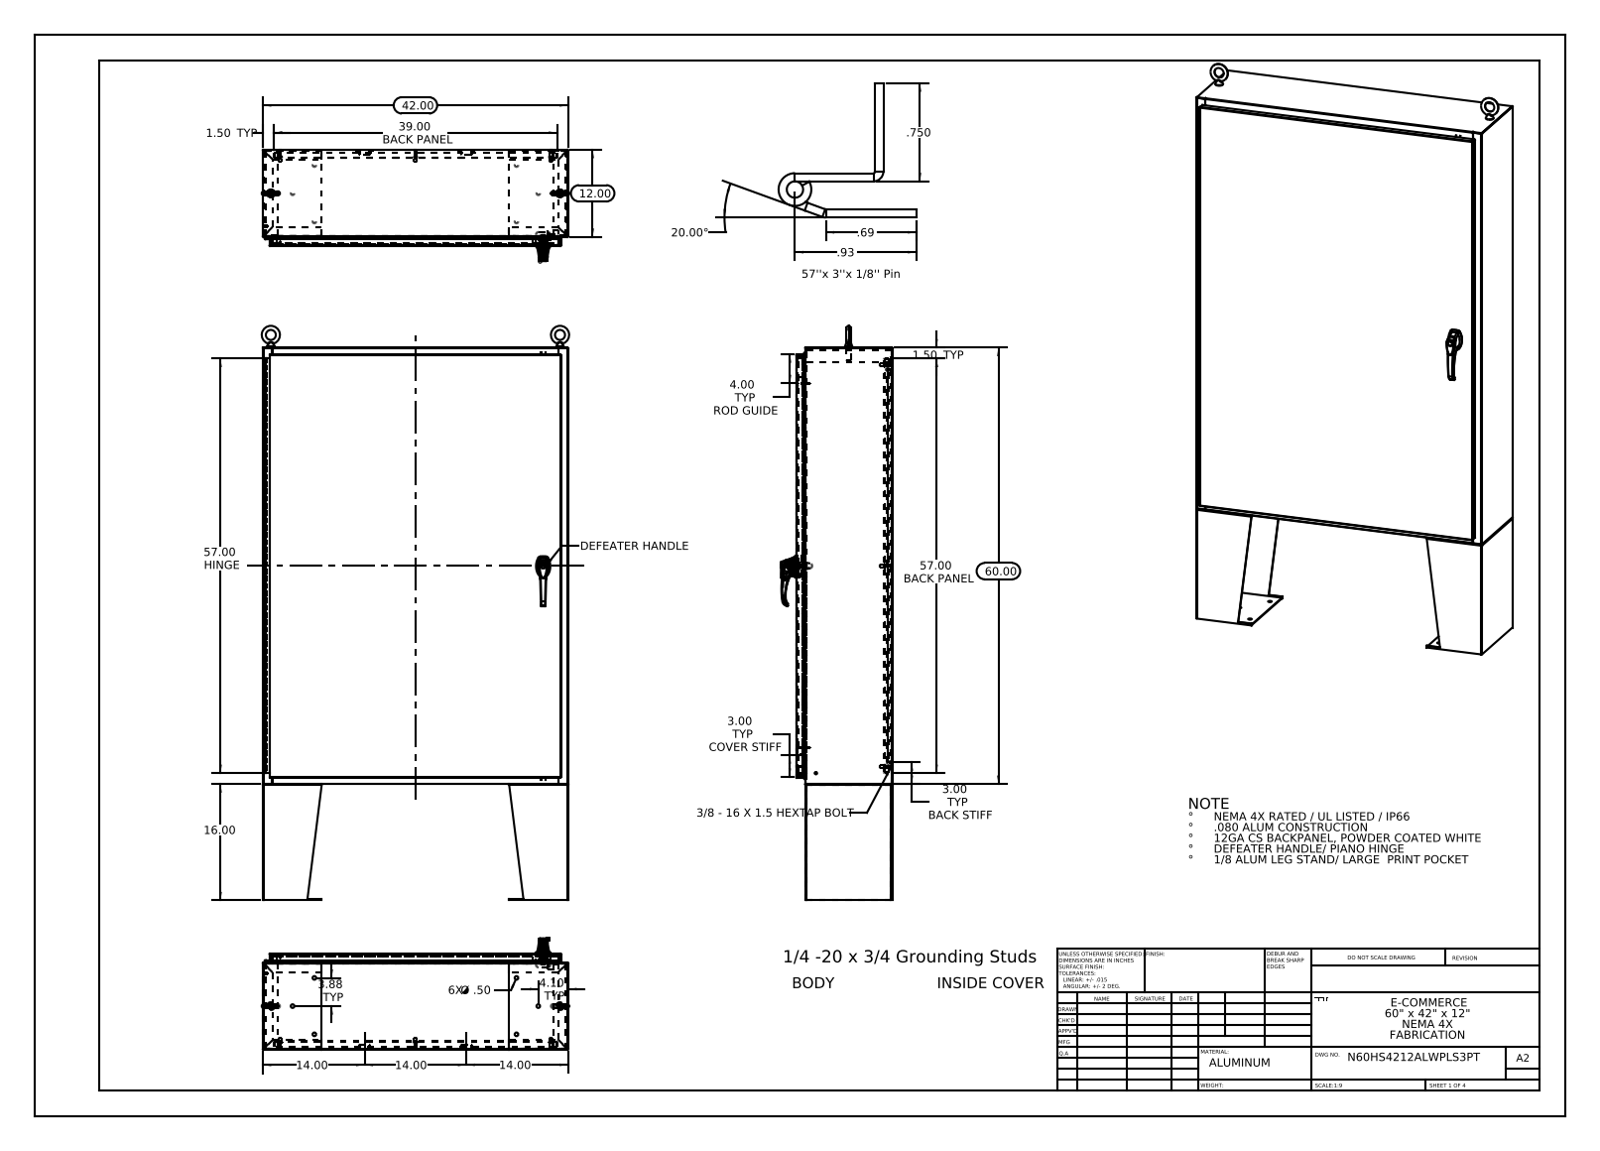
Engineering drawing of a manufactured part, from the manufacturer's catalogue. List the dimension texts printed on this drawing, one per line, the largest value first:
60.00
57.00 HINGE
57.00 BACK PANEL
42.00
39.00 BACK PANEL
20.00°
16.00
14.00
14.00
14.00
12.00
4.10 TYP
4.00 TYP ROD GUIDE
3.88 TYP
3.00 TYP COVER STIFF
3.00 TYP BACK STIFF
1.50 TYP
1.50 TYP
.93
.750
.69
6X Ø .50
